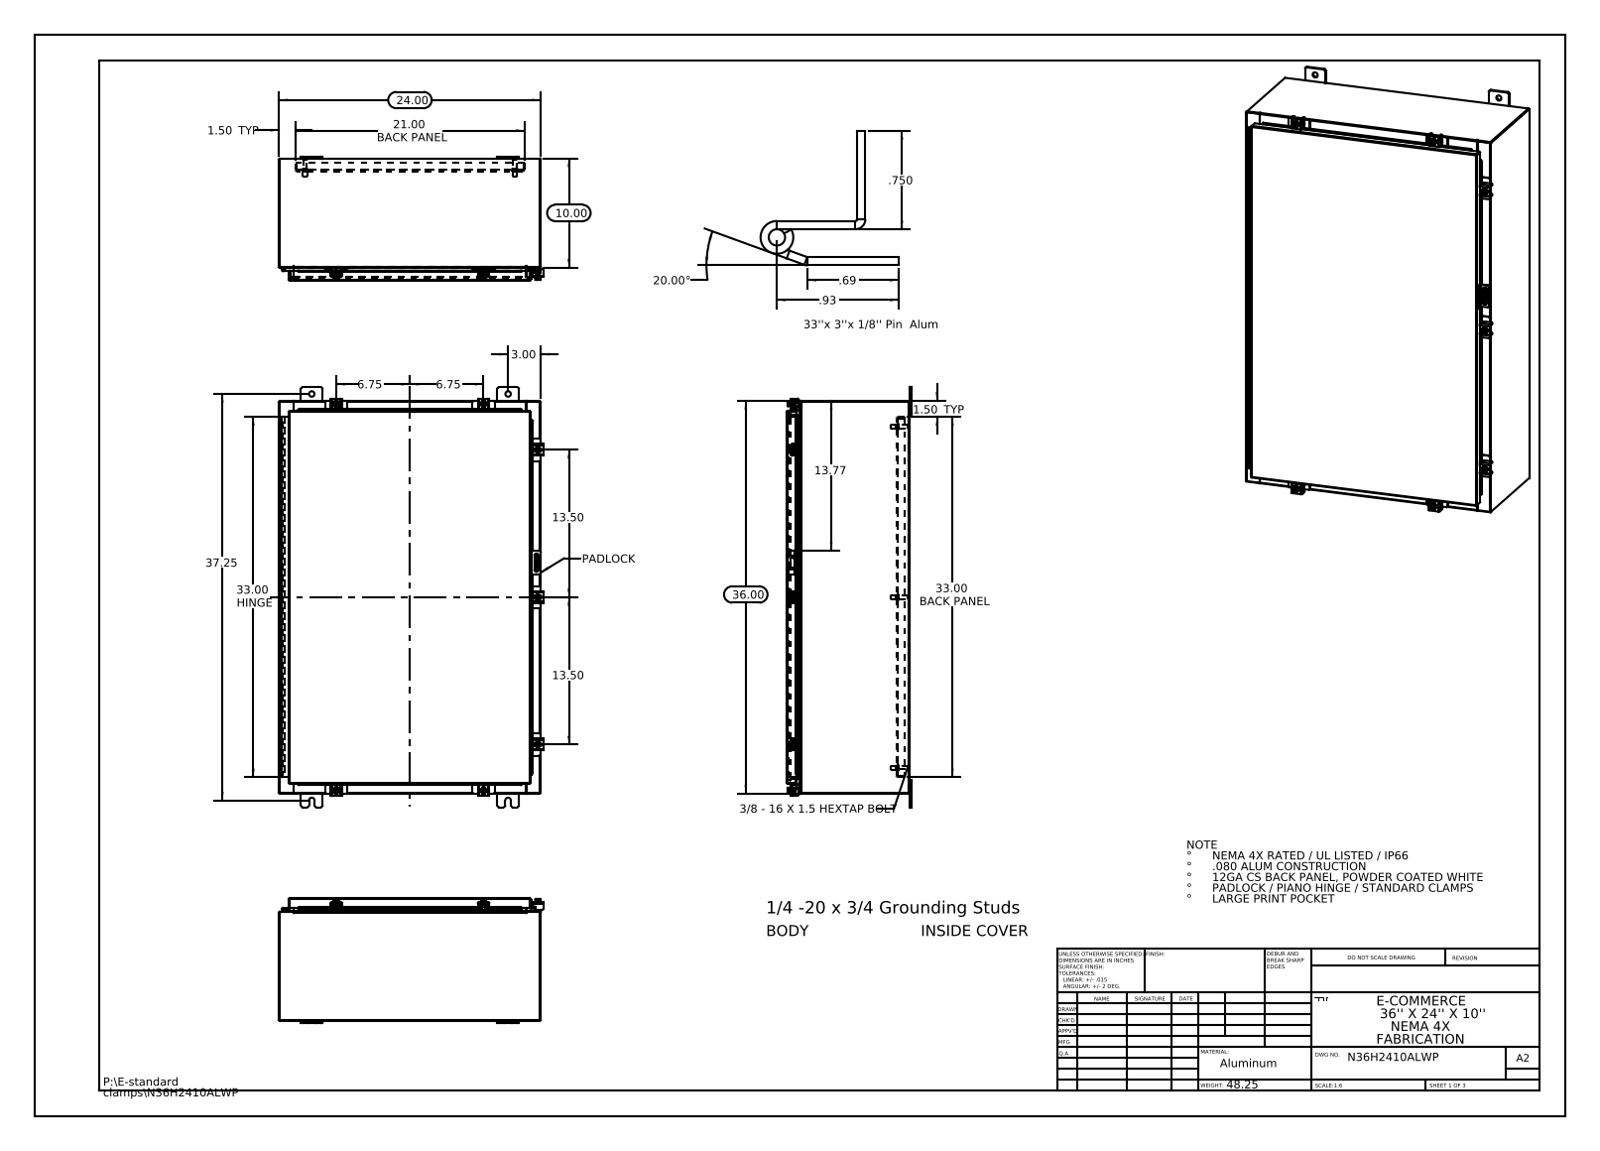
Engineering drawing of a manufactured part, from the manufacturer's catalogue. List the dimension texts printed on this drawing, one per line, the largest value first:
37.25
36.00
33.00 HINGE
33.00 BACK PANEL
24.00
21.00 BACK PANEL
20.00°
13.77
13.50
13.50
10.00
6.75
6.75
3.00
1.50 TYP
1.50 TYP
.93
.750
.69
